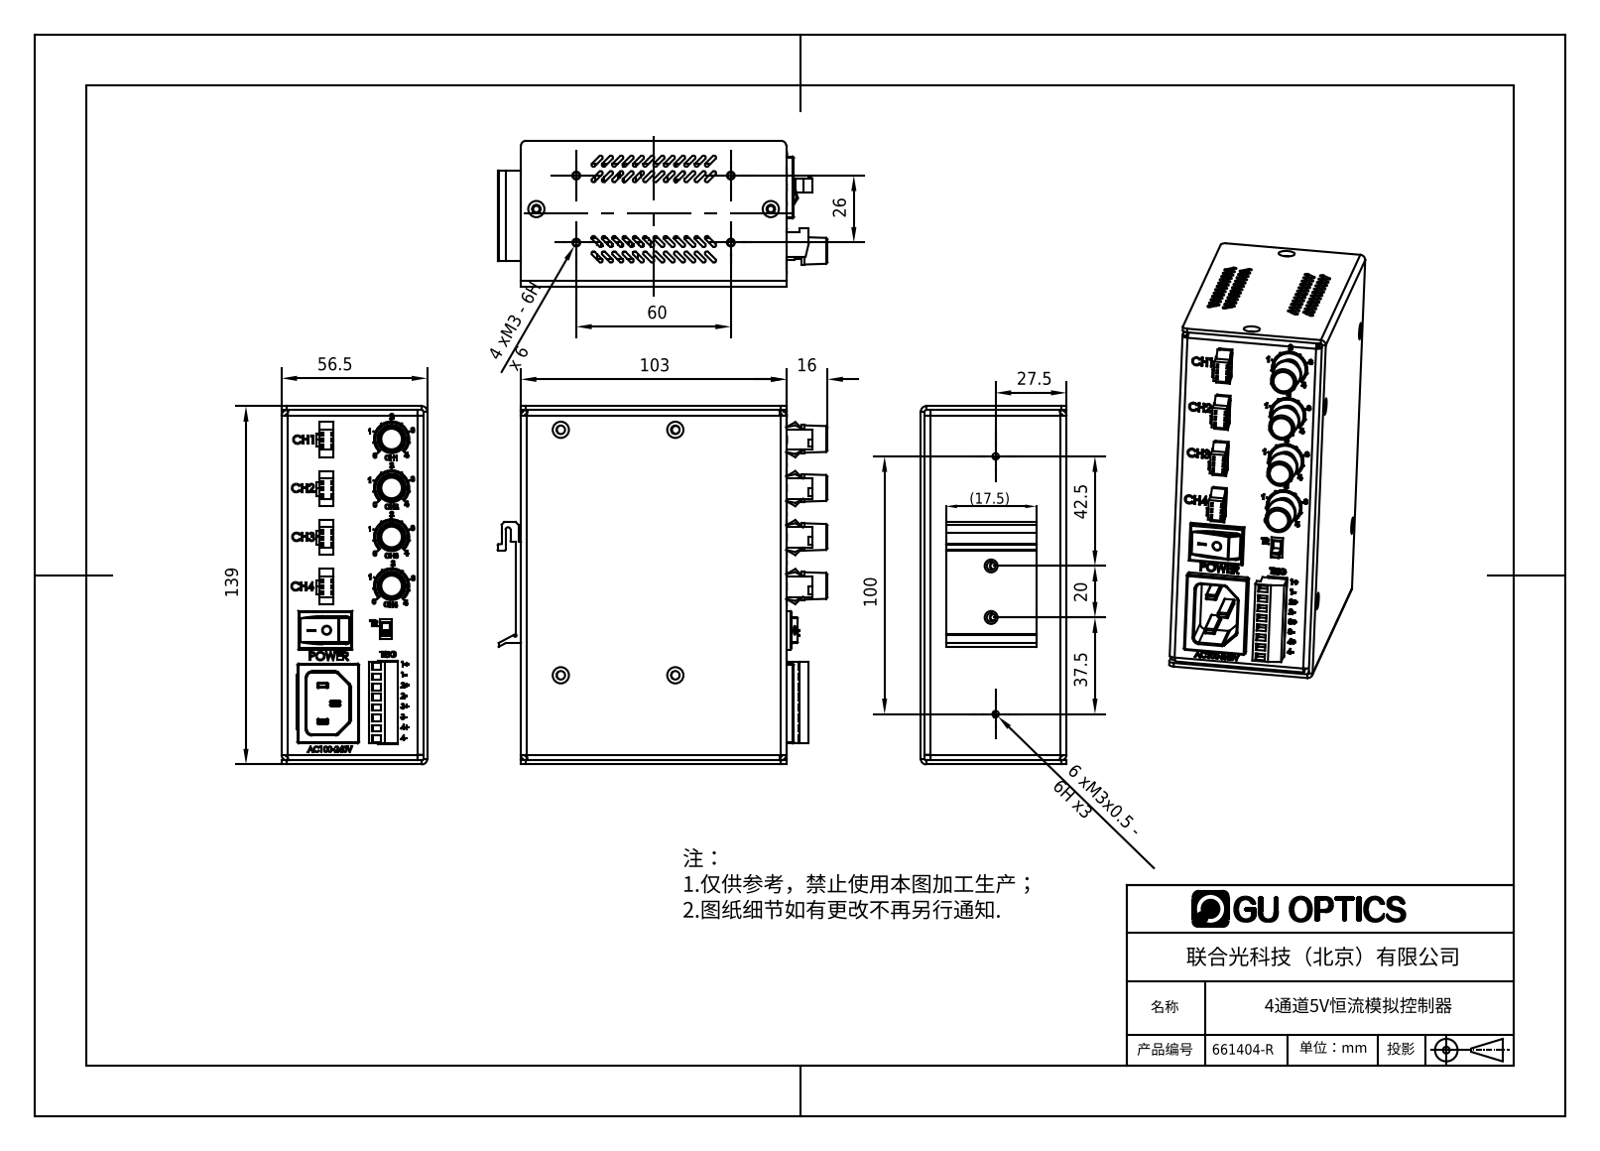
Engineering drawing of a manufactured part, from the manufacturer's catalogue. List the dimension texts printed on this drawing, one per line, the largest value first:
139
103
100
60
56.5
42.5
37.5
27.5
26
20
(17.5)
16
6 xM3x0.5 - 6H x3
4 xM3 - 6H x 6
